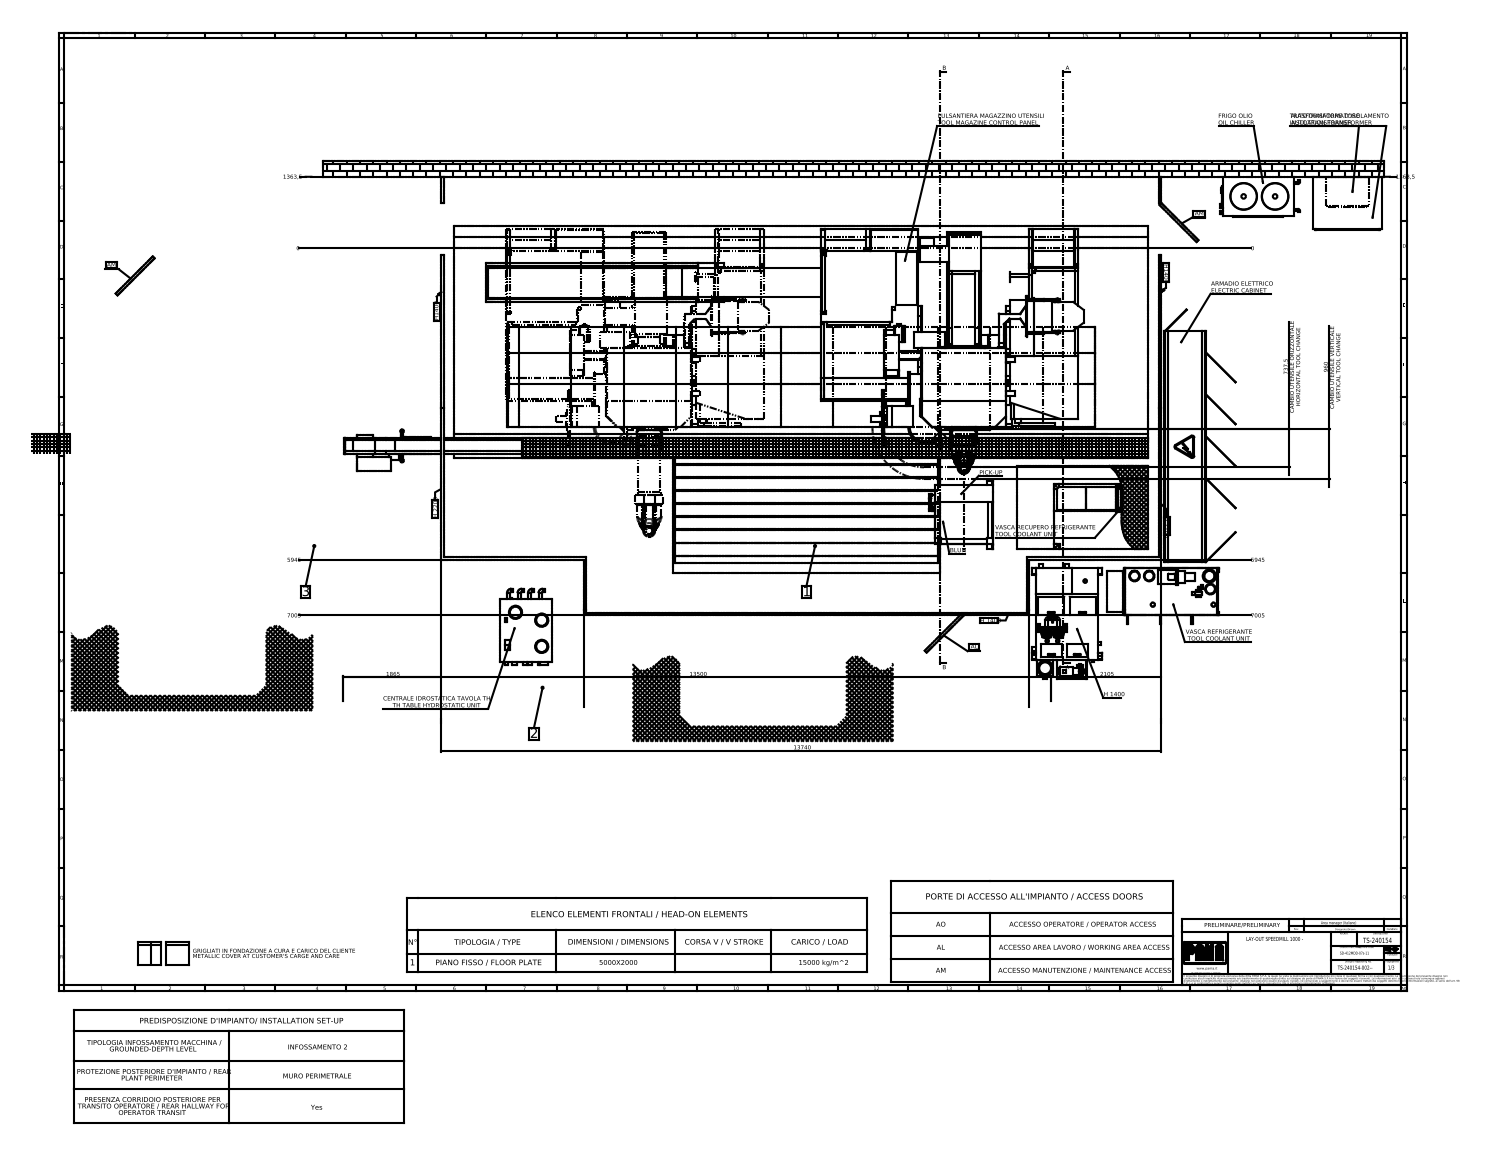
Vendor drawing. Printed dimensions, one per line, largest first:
13740
13500
7005
7005
5945
5945
2105
1865
1363,5
1363,5
960 CAMBIO UTENSILE VERTICALE VERTICAL TOOL CHANGE
737,5 CAMBIO UTENSILE ORIZZONTALE HORIZONTAL TOOL CHANGE
0
0
